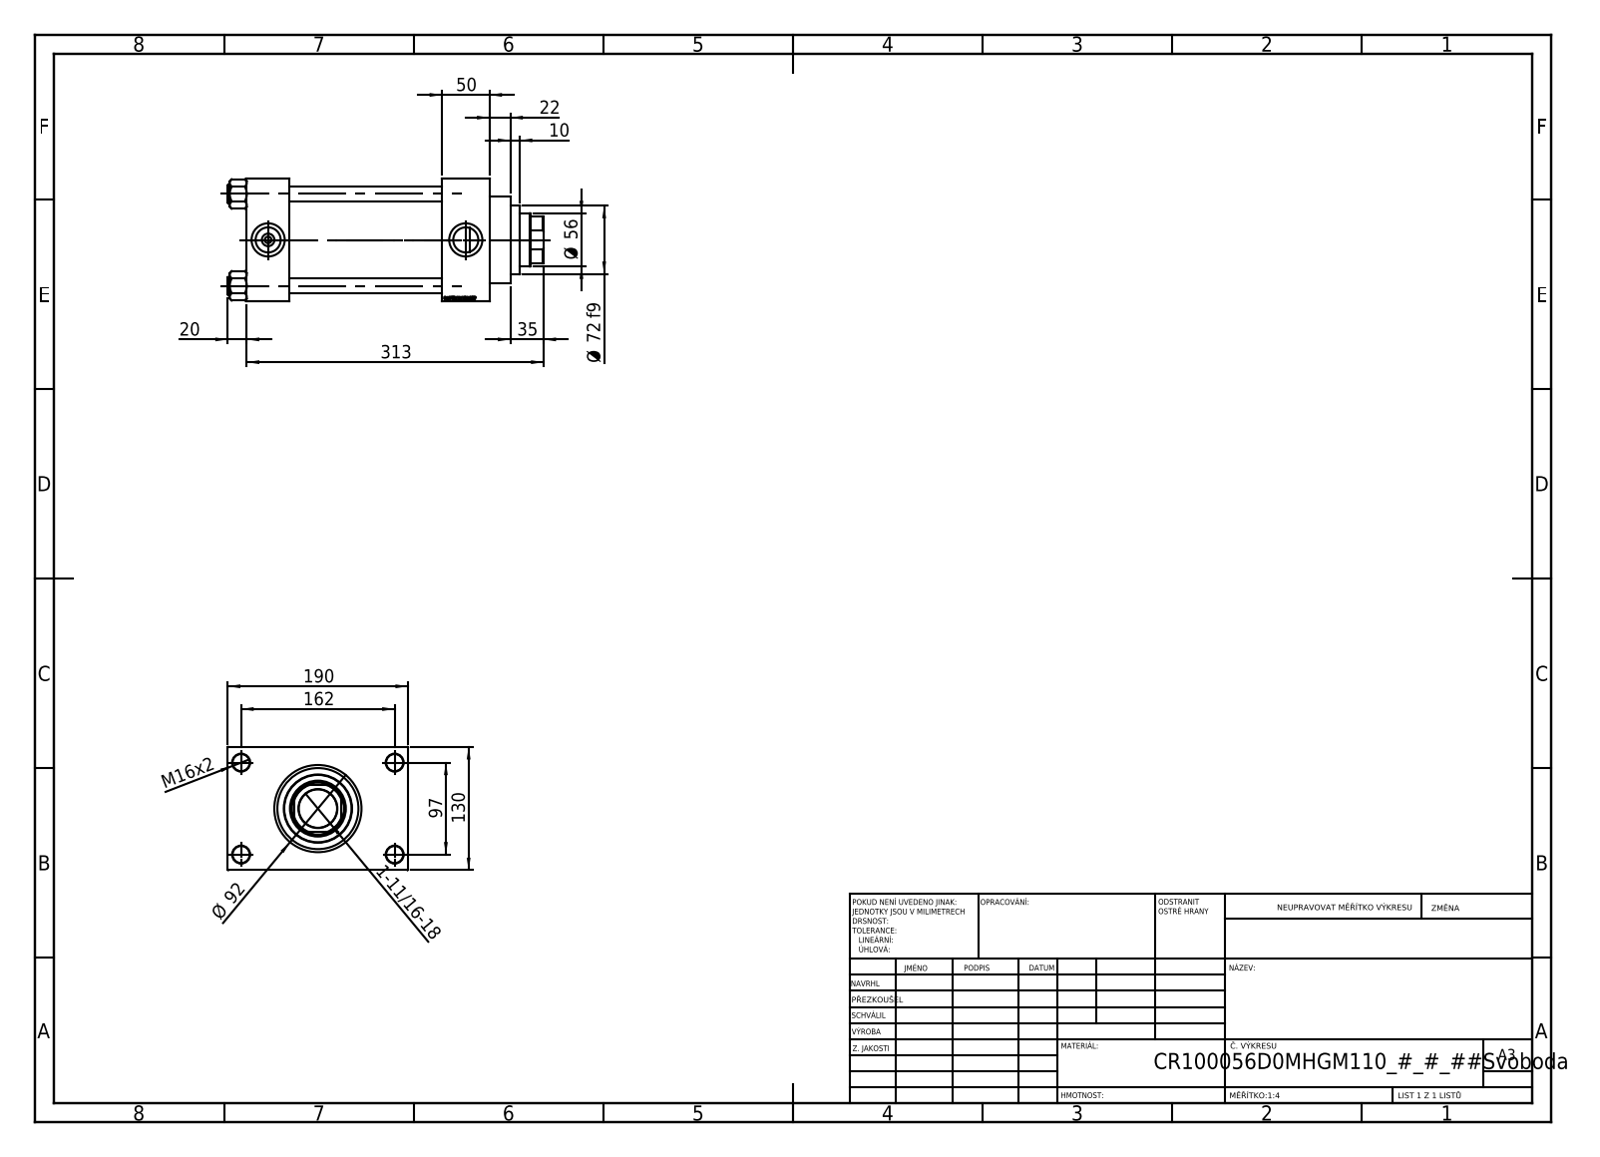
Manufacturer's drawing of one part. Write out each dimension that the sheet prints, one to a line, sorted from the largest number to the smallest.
313
190
162
130
97
Ø 92
Ø 72 f9
Ø 56
50
35
22
20
M16x2
10
1-11/16-18
